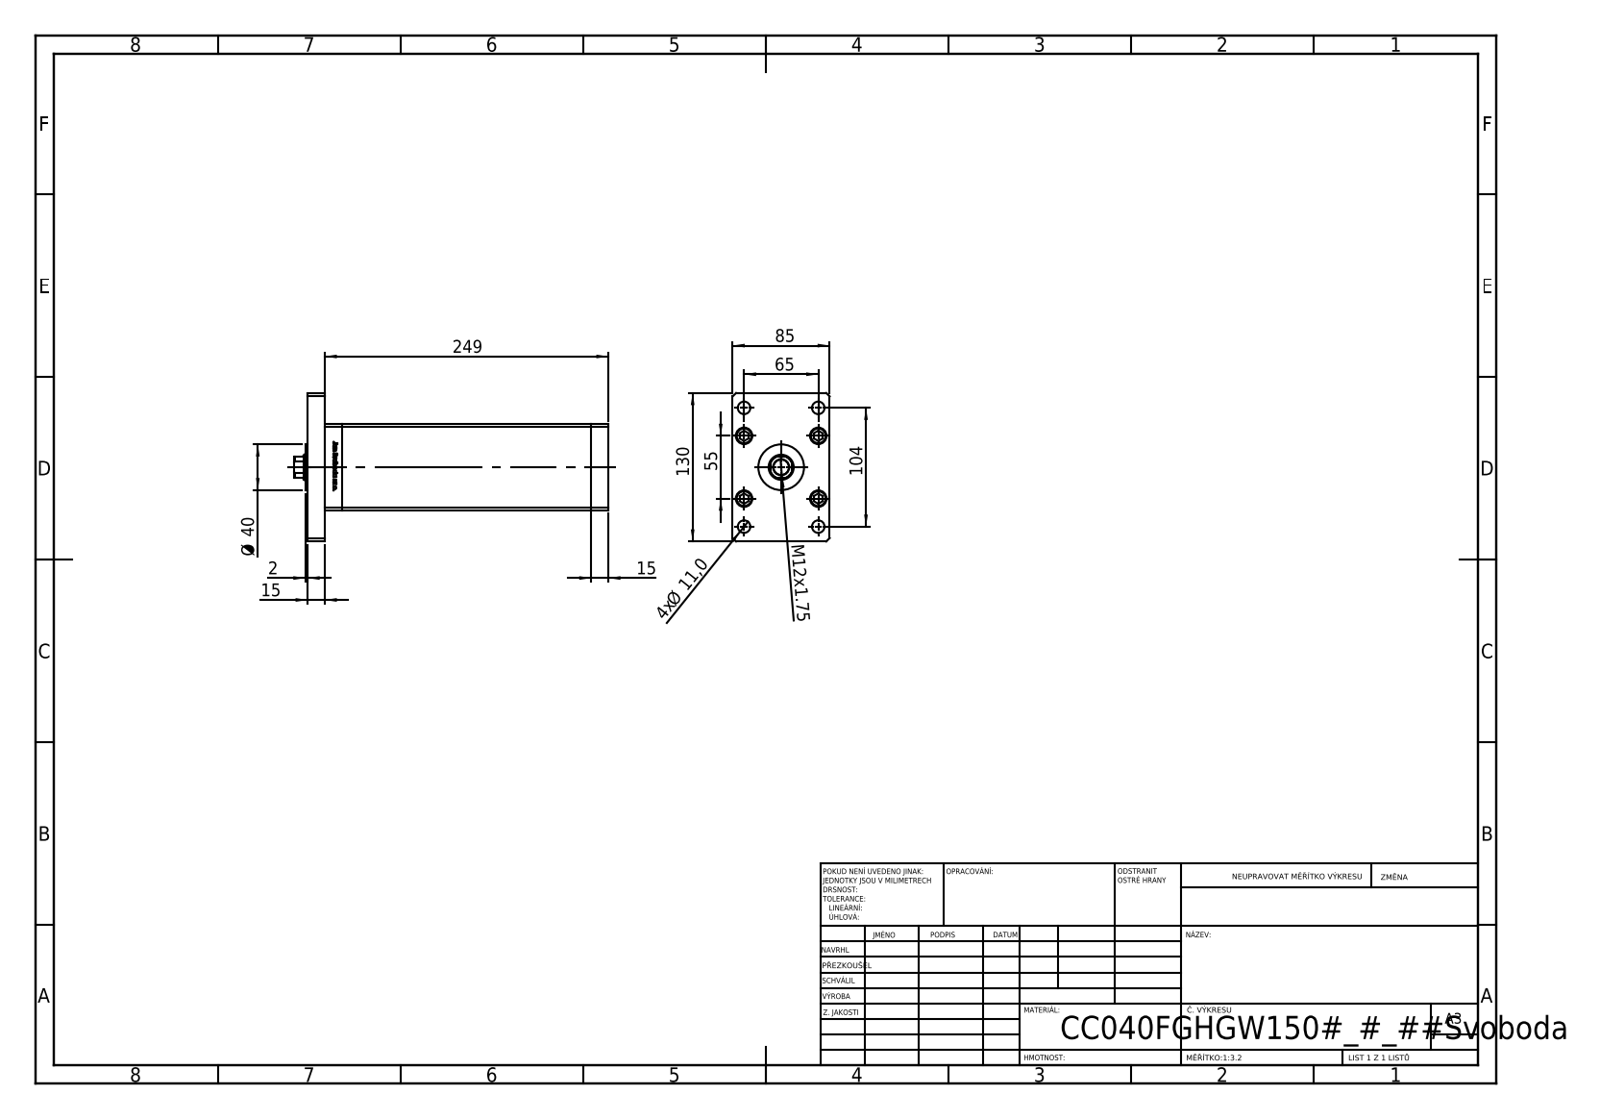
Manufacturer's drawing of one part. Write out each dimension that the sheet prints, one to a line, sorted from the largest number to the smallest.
249
130
104
85
65
55
Ø 40
15
15
M12x1.75
4x Ø 11,0
2
